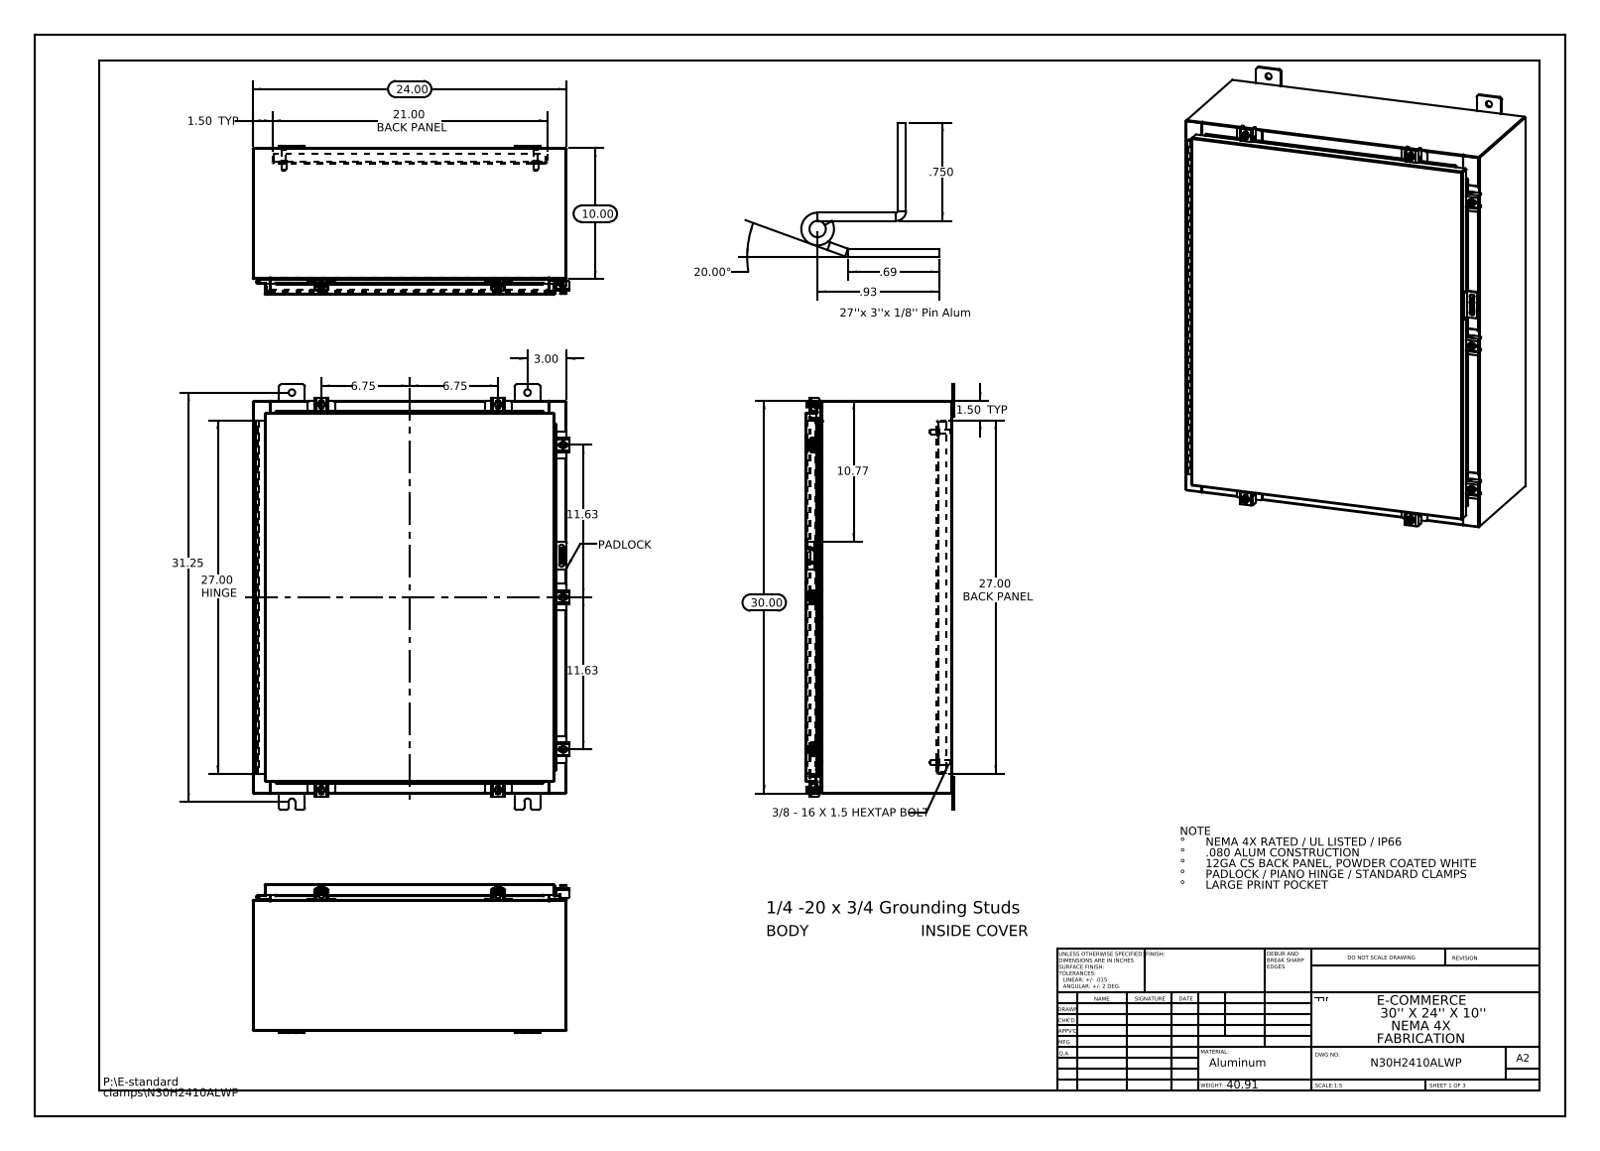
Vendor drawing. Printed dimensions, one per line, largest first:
31.25
30.00
27.00 HINGE
27.00 BACK PANEL
24.00
21.00 BACK PANEL
20.00°
11.63
11.63
10.77
10.00
6.75
6.75
3.00
1.50 TYP
1.50 TYP
.93
.750
.69
